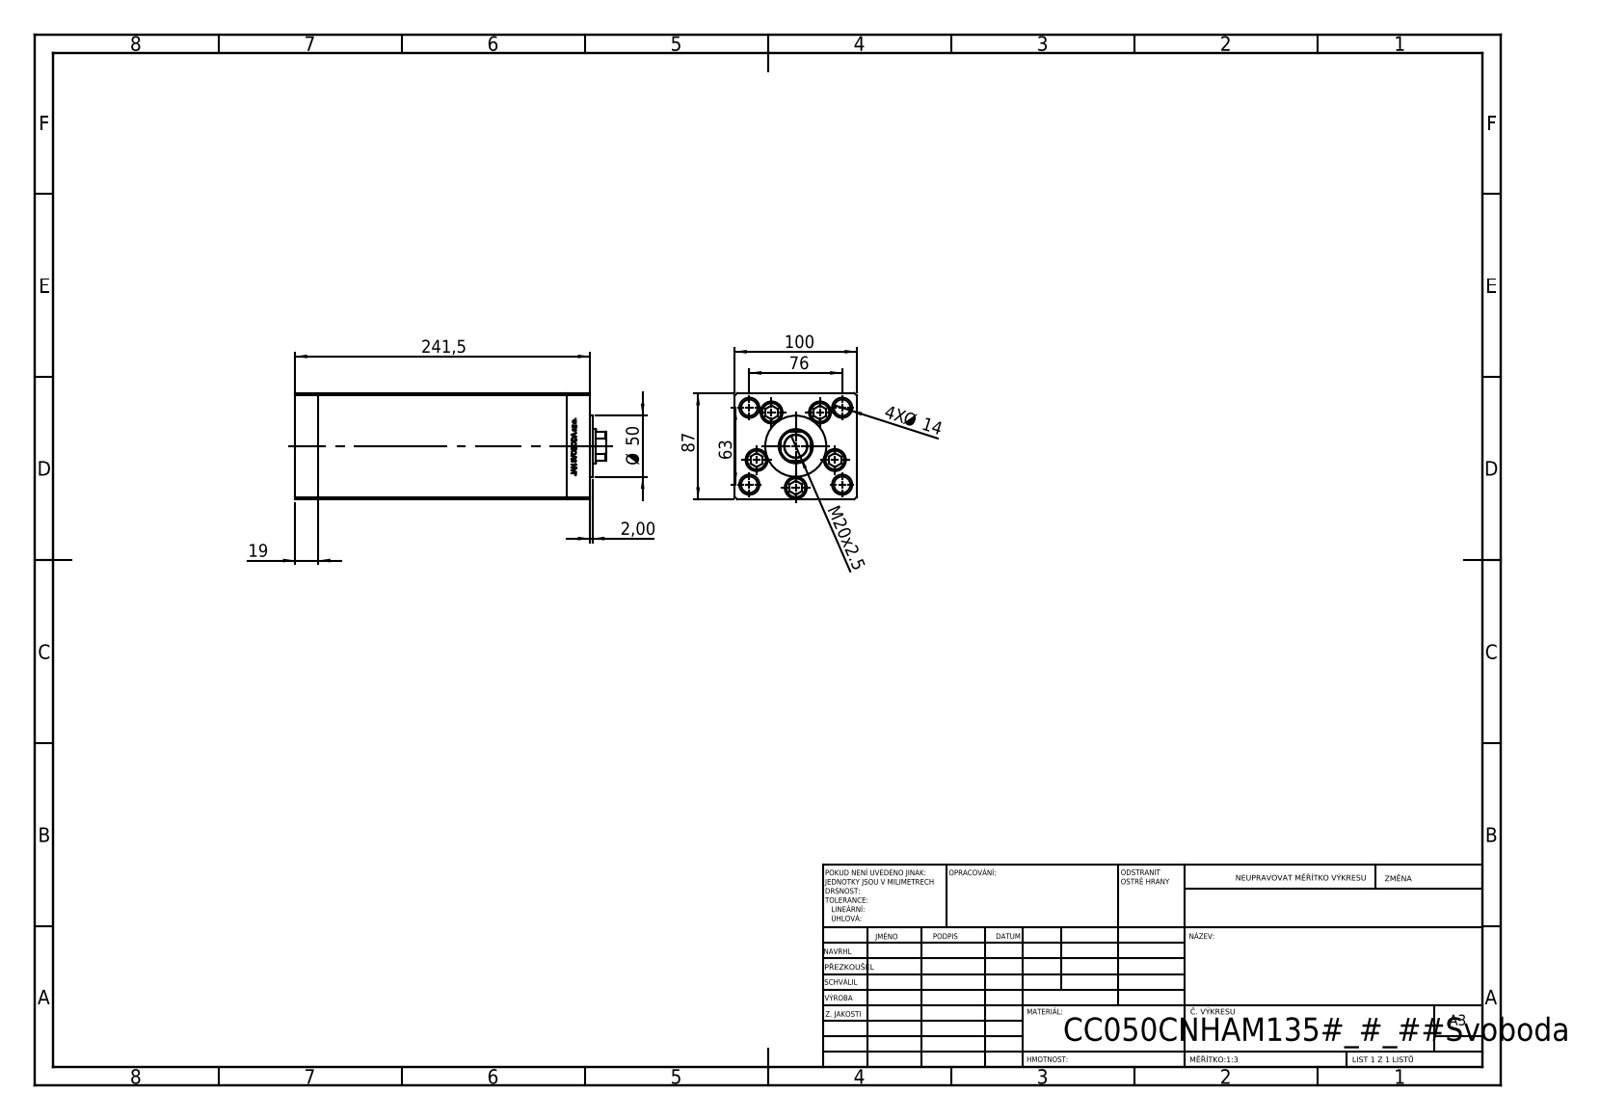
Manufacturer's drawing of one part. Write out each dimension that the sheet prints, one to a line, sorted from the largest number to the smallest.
241,5
100
87
76
63
Ø 50
M20x2.5
19
4X Ø 14
2,00
